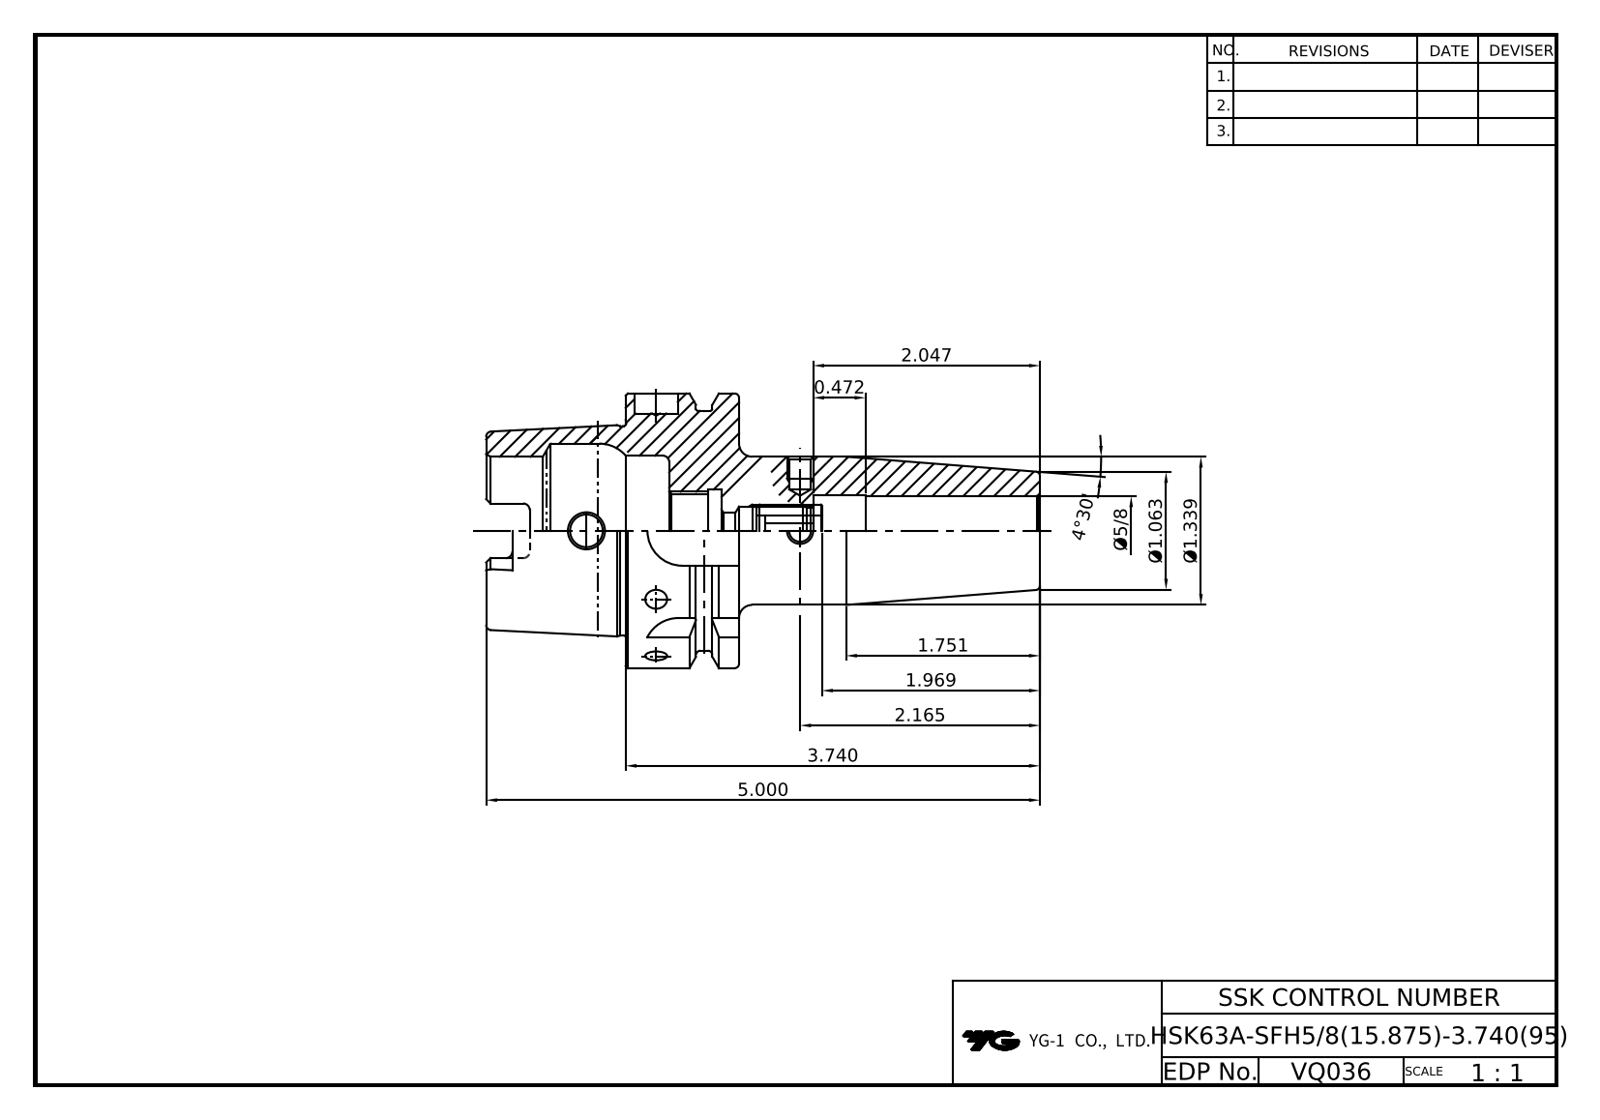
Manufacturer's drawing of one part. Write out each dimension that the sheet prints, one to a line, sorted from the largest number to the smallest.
5.000
4°30'
3.740
2.165
2.047
1.969
1.751
Ø1.339
Ø1.063
0.472
